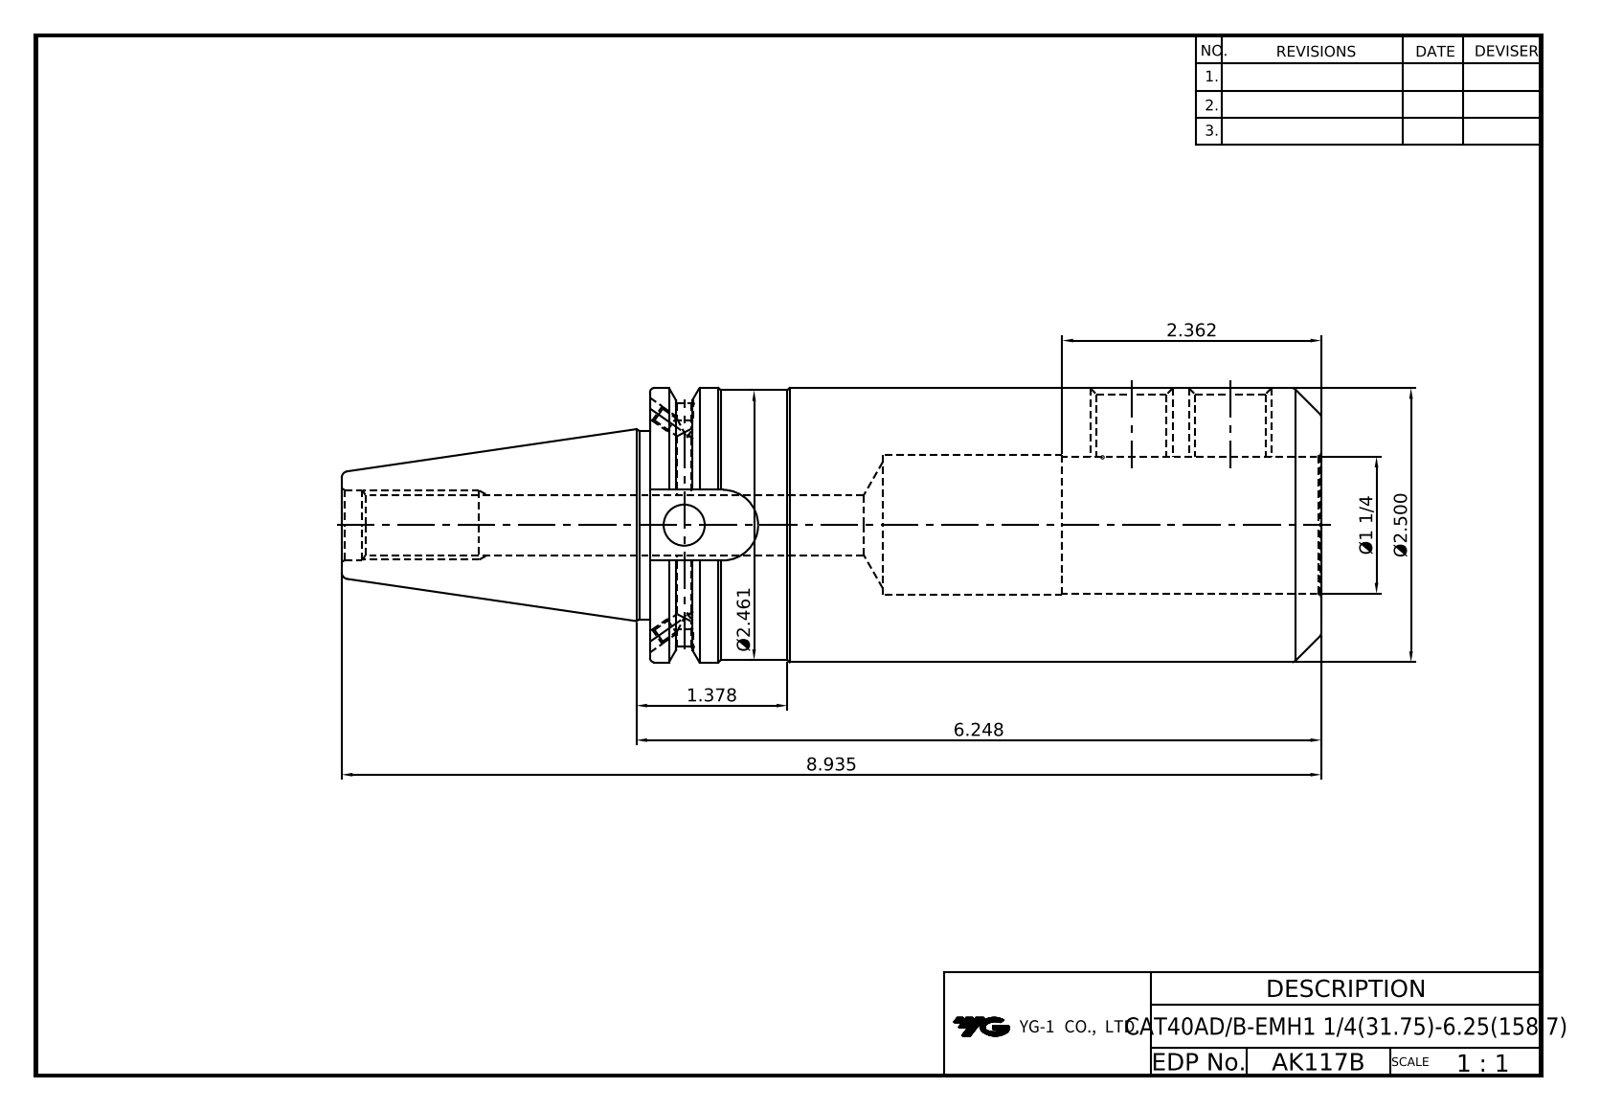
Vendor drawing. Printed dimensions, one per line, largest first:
8.935
6.248
Ø2.500
Ø2.461
2.362
1.378
Ø1 1/4
